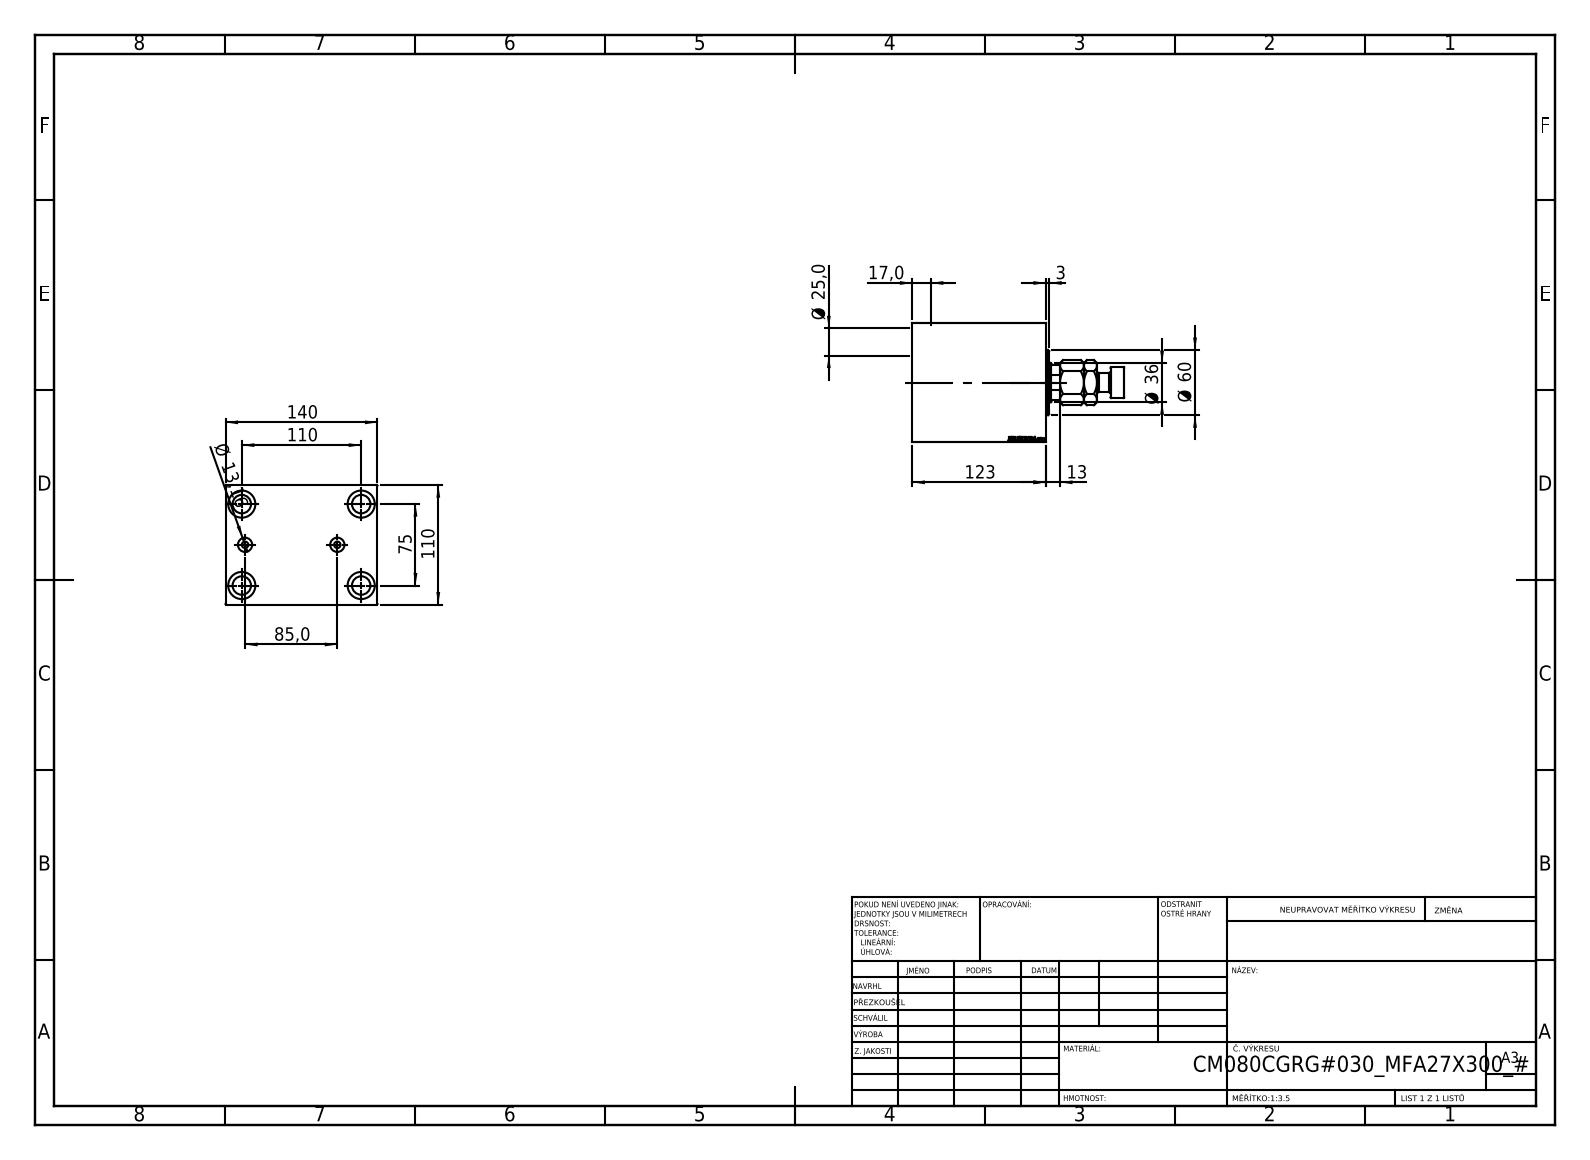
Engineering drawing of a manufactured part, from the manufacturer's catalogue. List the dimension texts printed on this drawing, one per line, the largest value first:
140
123
110
110
85,0
75
Ø 60
Ø 36
Ø 25,0
17,0
Ø 13,16
13
3
